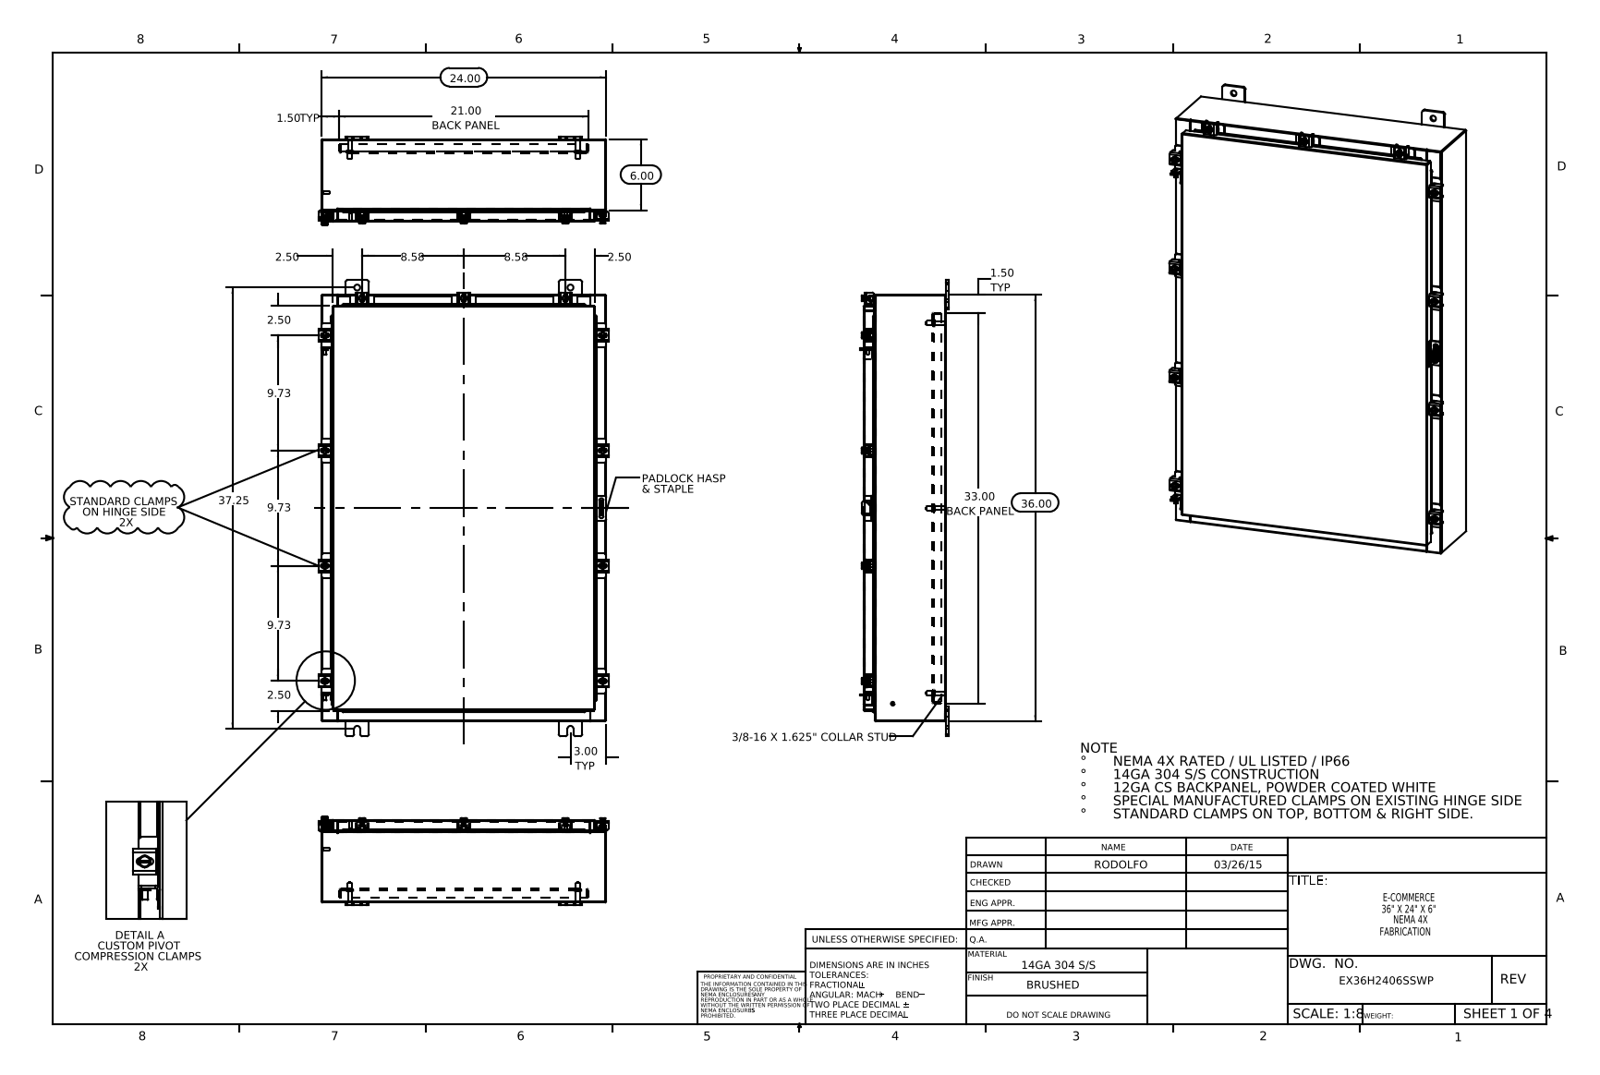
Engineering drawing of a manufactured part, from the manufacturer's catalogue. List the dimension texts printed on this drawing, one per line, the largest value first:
37.25
36.00
33.00 BACK PANEL
24.00
21.00 BACK PANEL
9.73
9.73
9.73
8.58
8.58
6.00
3.00 TYP
2.50
2.50
2.50
2.50
1.50 TYP
1.50 TYP
